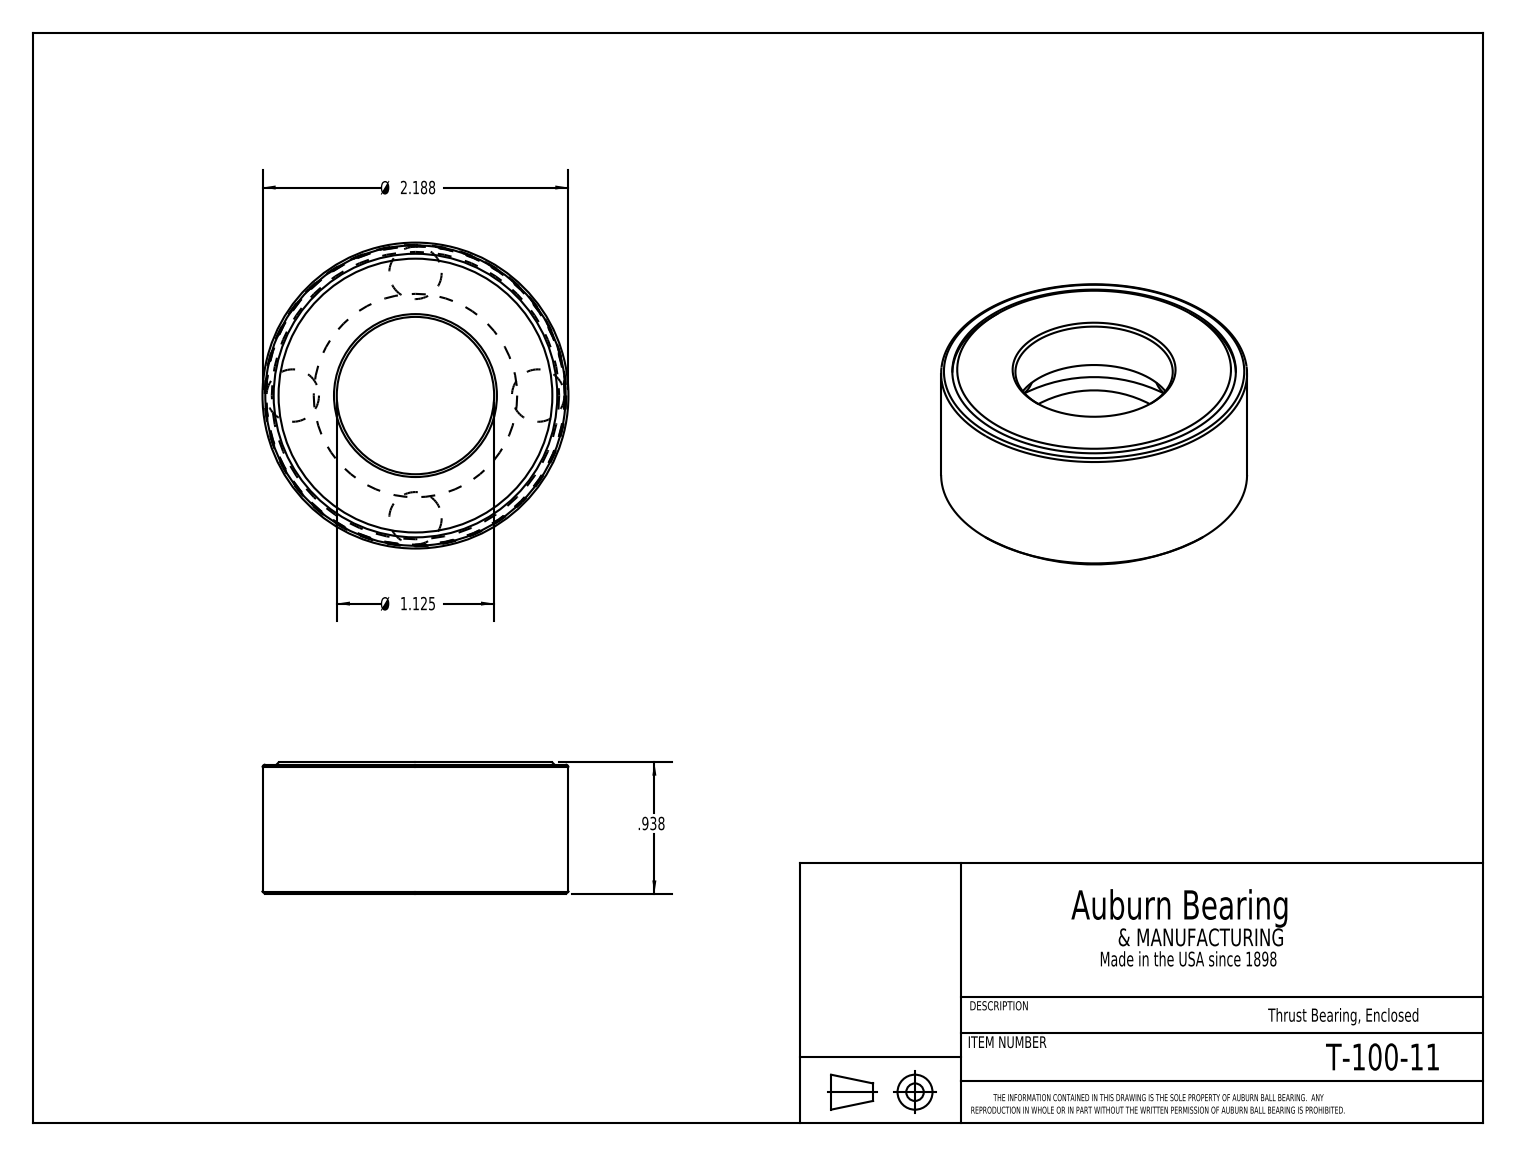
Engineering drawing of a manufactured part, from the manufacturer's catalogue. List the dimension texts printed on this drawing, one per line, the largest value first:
Ø 2.188
Ø 1.125
.938
